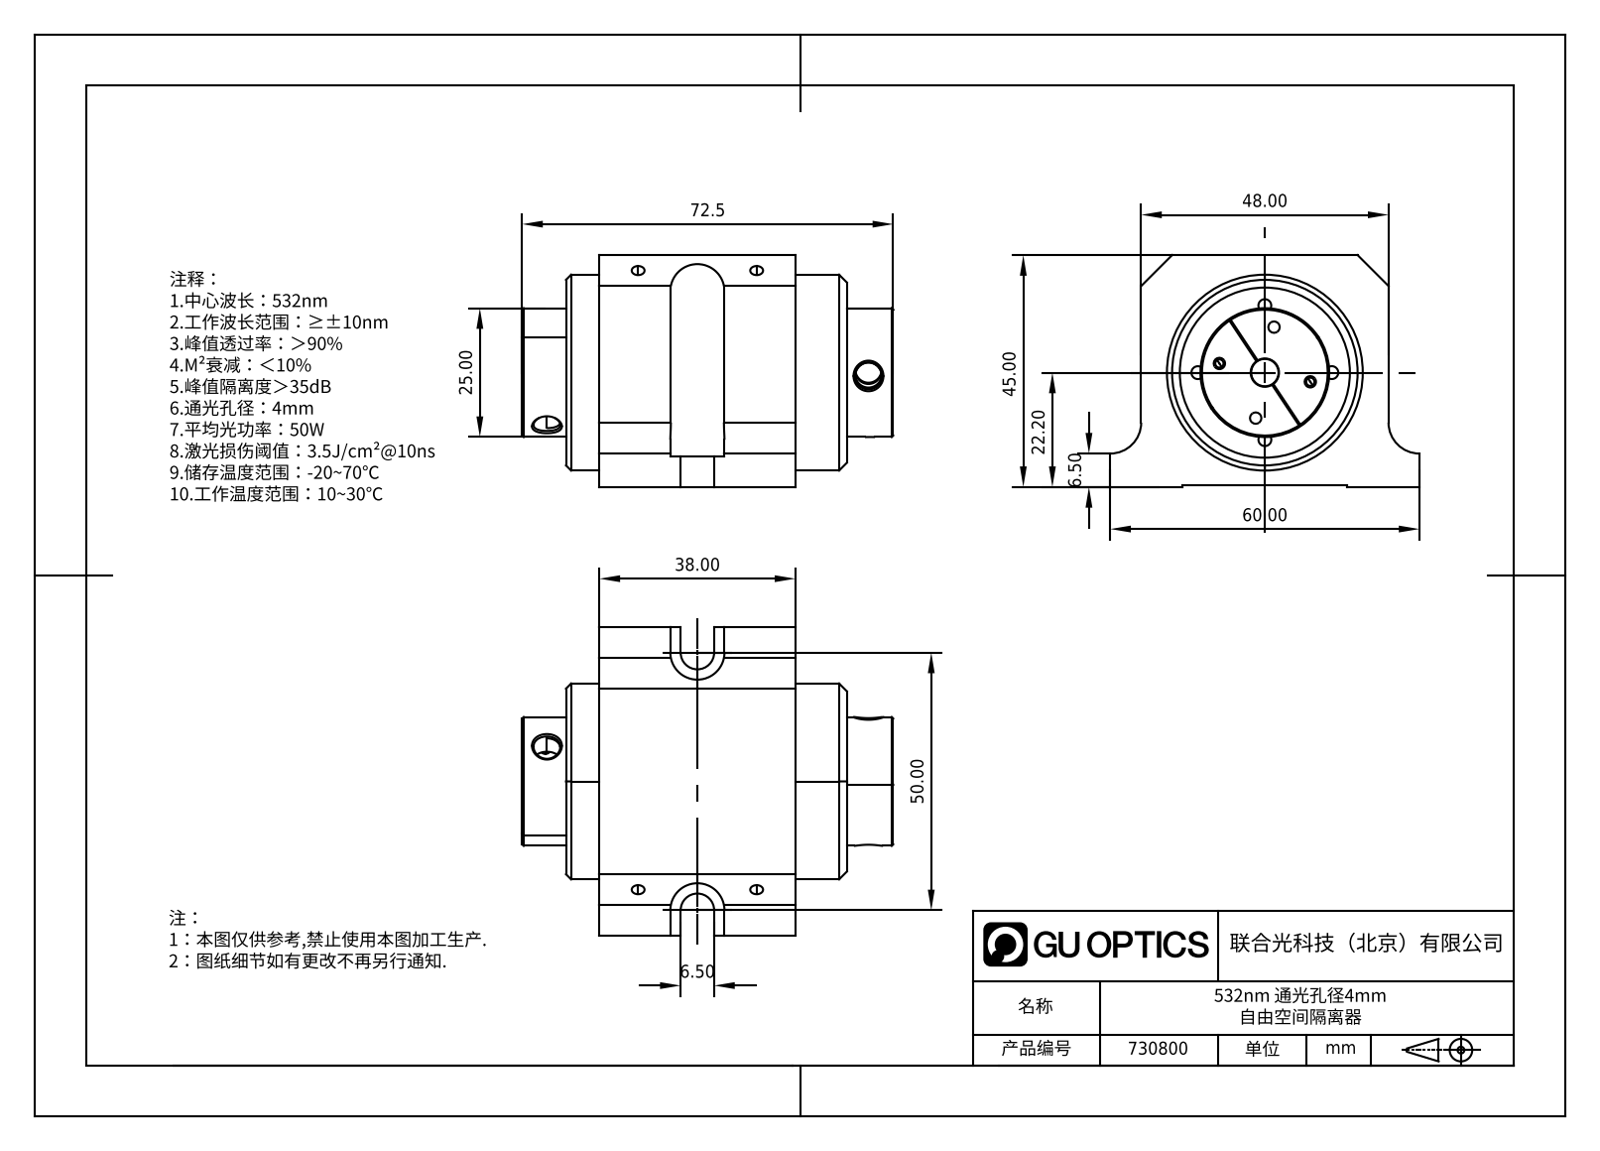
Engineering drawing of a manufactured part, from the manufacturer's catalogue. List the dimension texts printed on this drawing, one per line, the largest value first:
72.5
60.00
50.00
48.00
45.00
38.00
25.00
22.20
6.50
6.50
